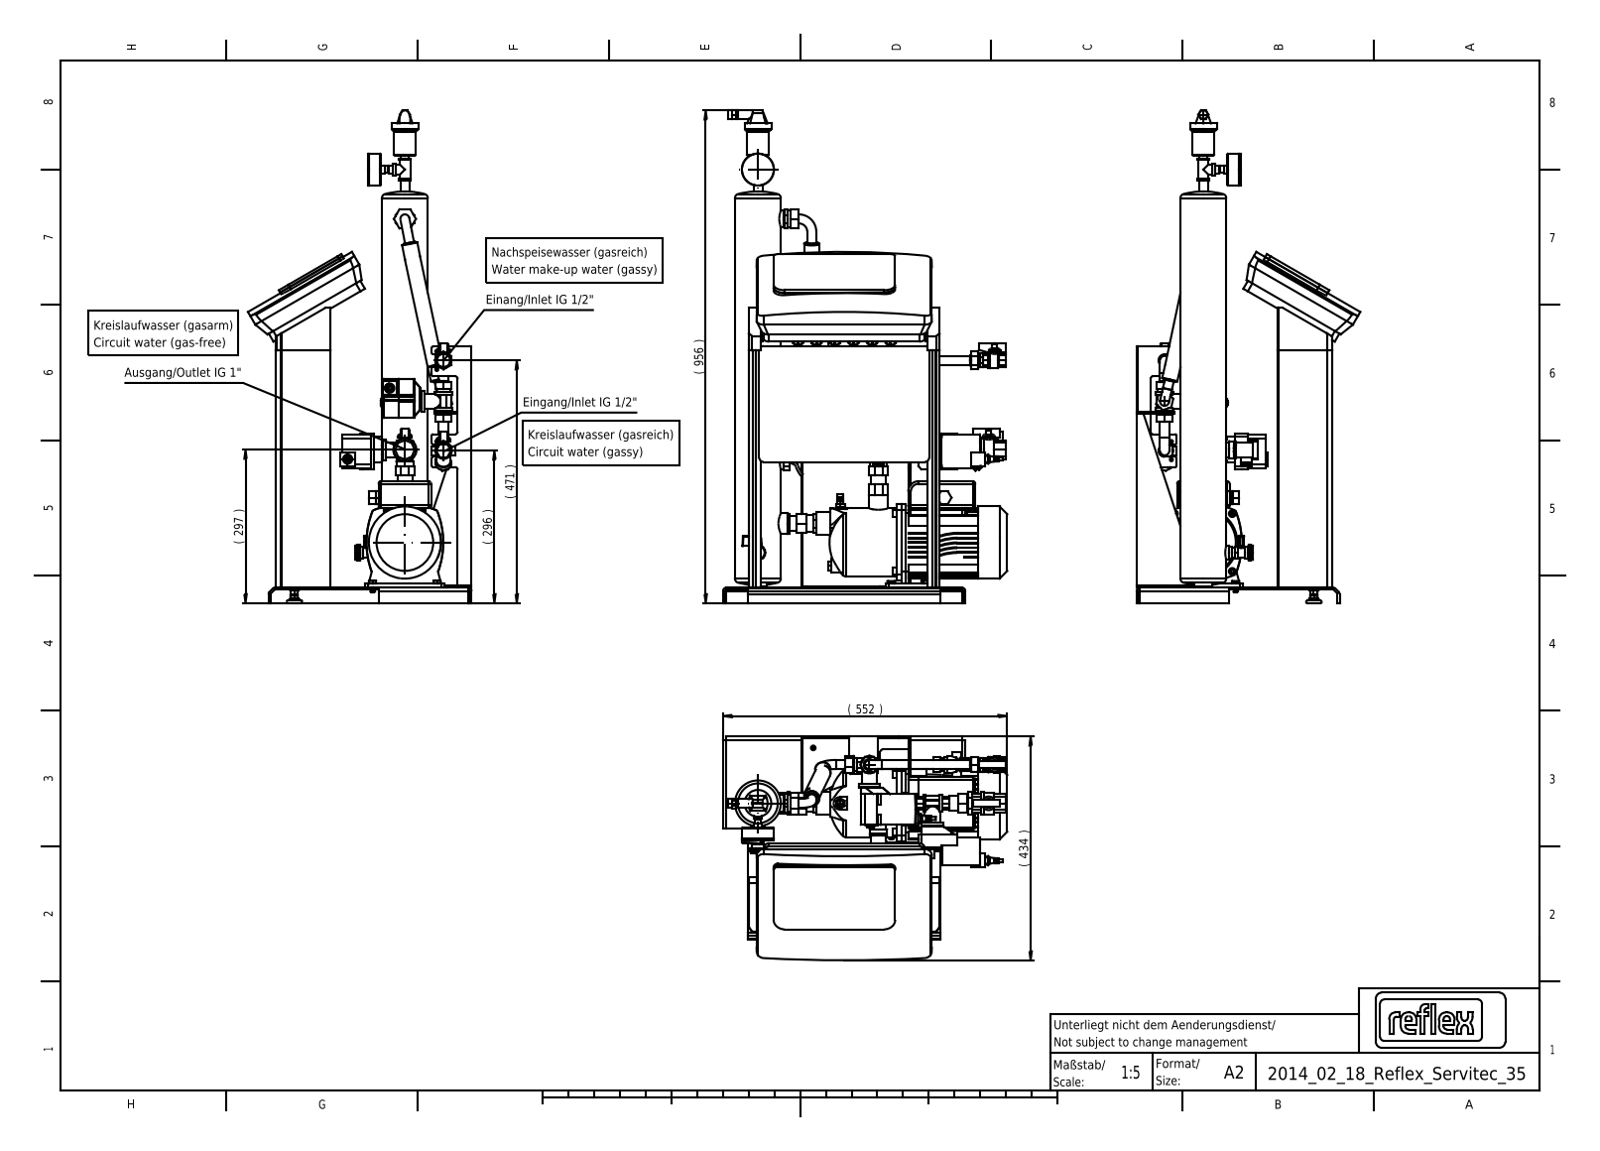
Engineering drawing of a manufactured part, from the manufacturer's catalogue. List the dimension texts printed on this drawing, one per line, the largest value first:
956 ( )
552 ( )
471 ( )
434 ( )
297 ( )
296 ( )
